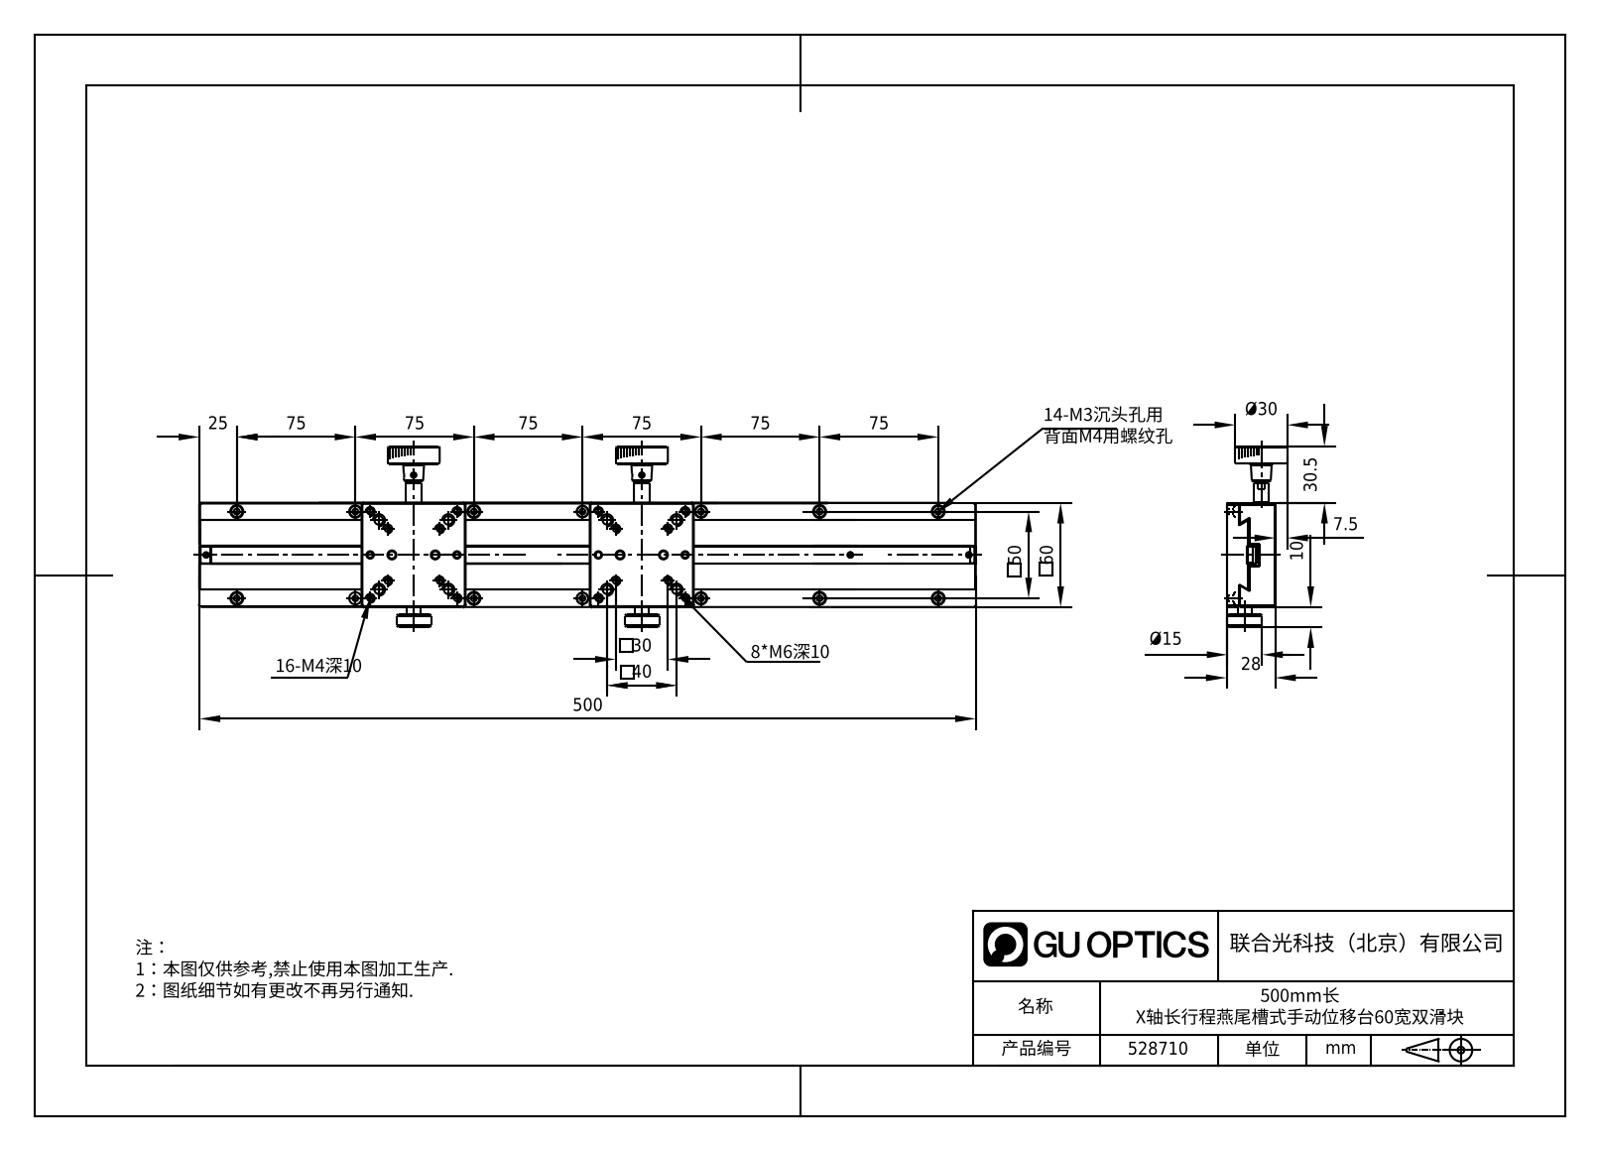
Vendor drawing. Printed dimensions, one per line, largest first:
500
75
75
75
75
75
75
60
50
40
30.5
Ø30
30
28
25
Ø15
10
7.5
